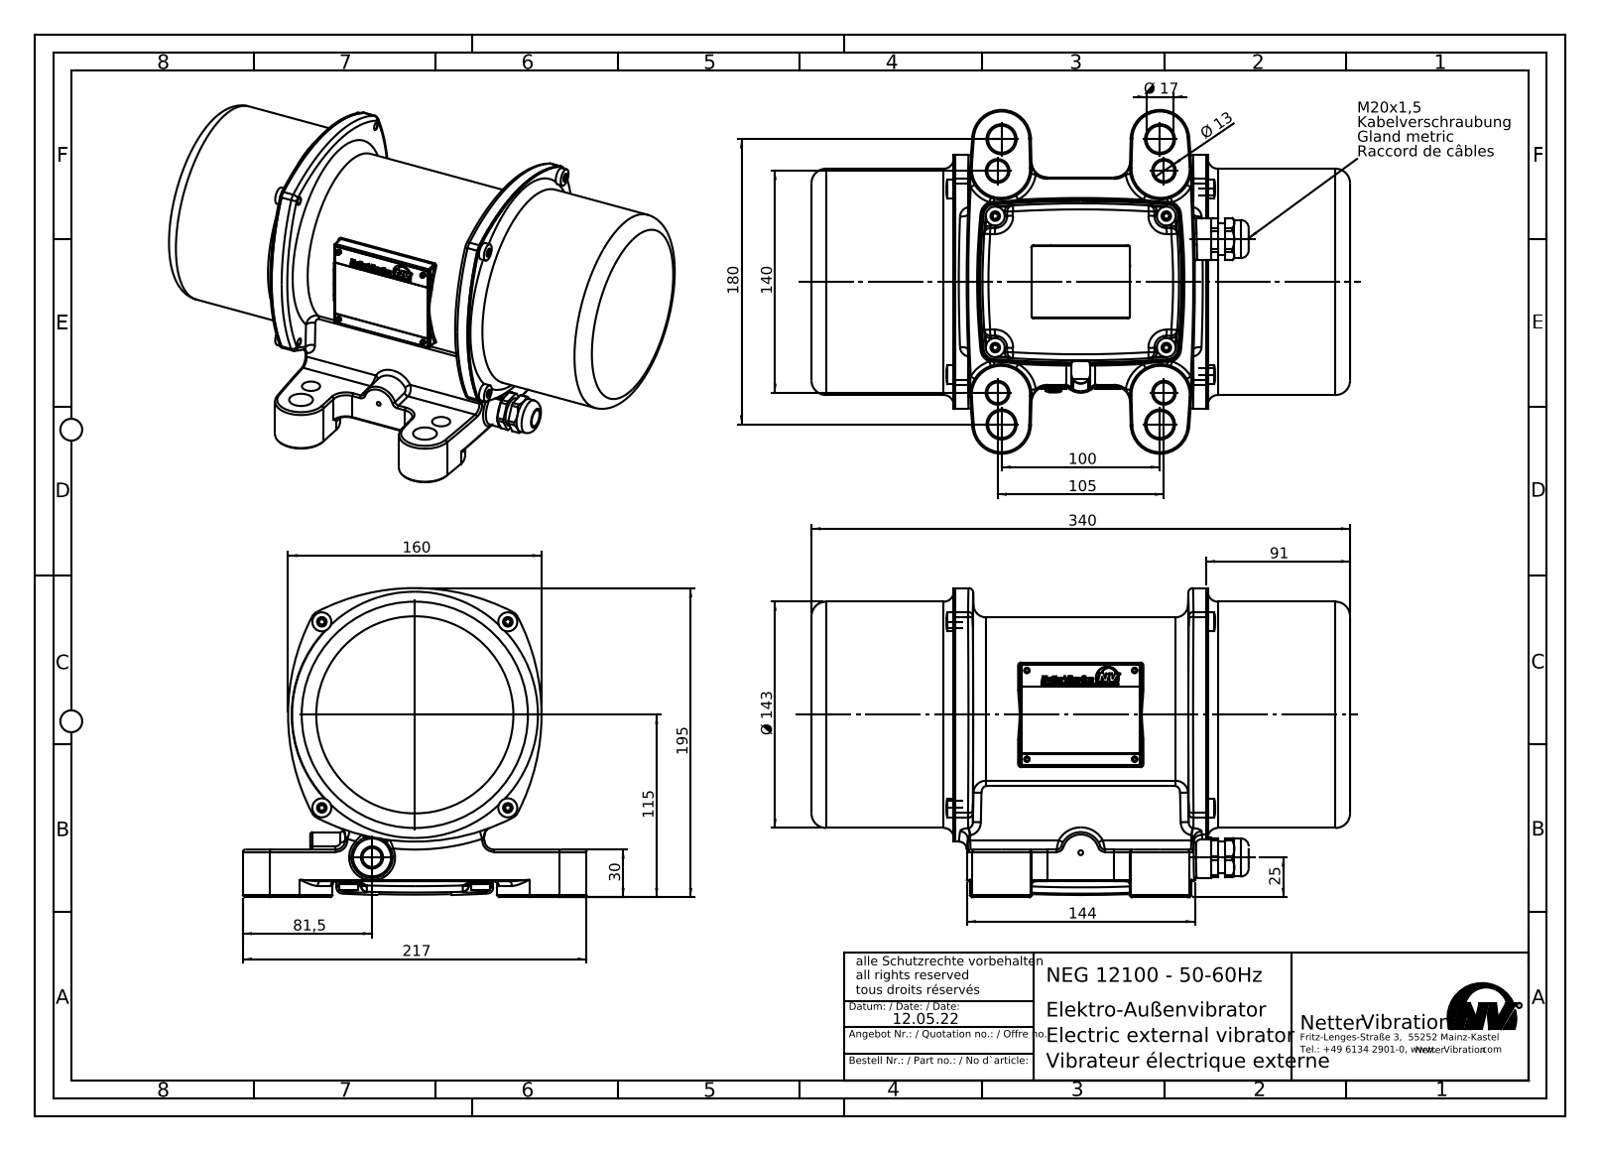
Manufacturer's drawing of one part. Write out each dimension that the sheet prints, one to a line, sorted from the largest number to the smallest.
340
217
195
180
160
144
Ø 143
140
115
105
100
91
81,5
30
25
Ø 17
Ø 13
